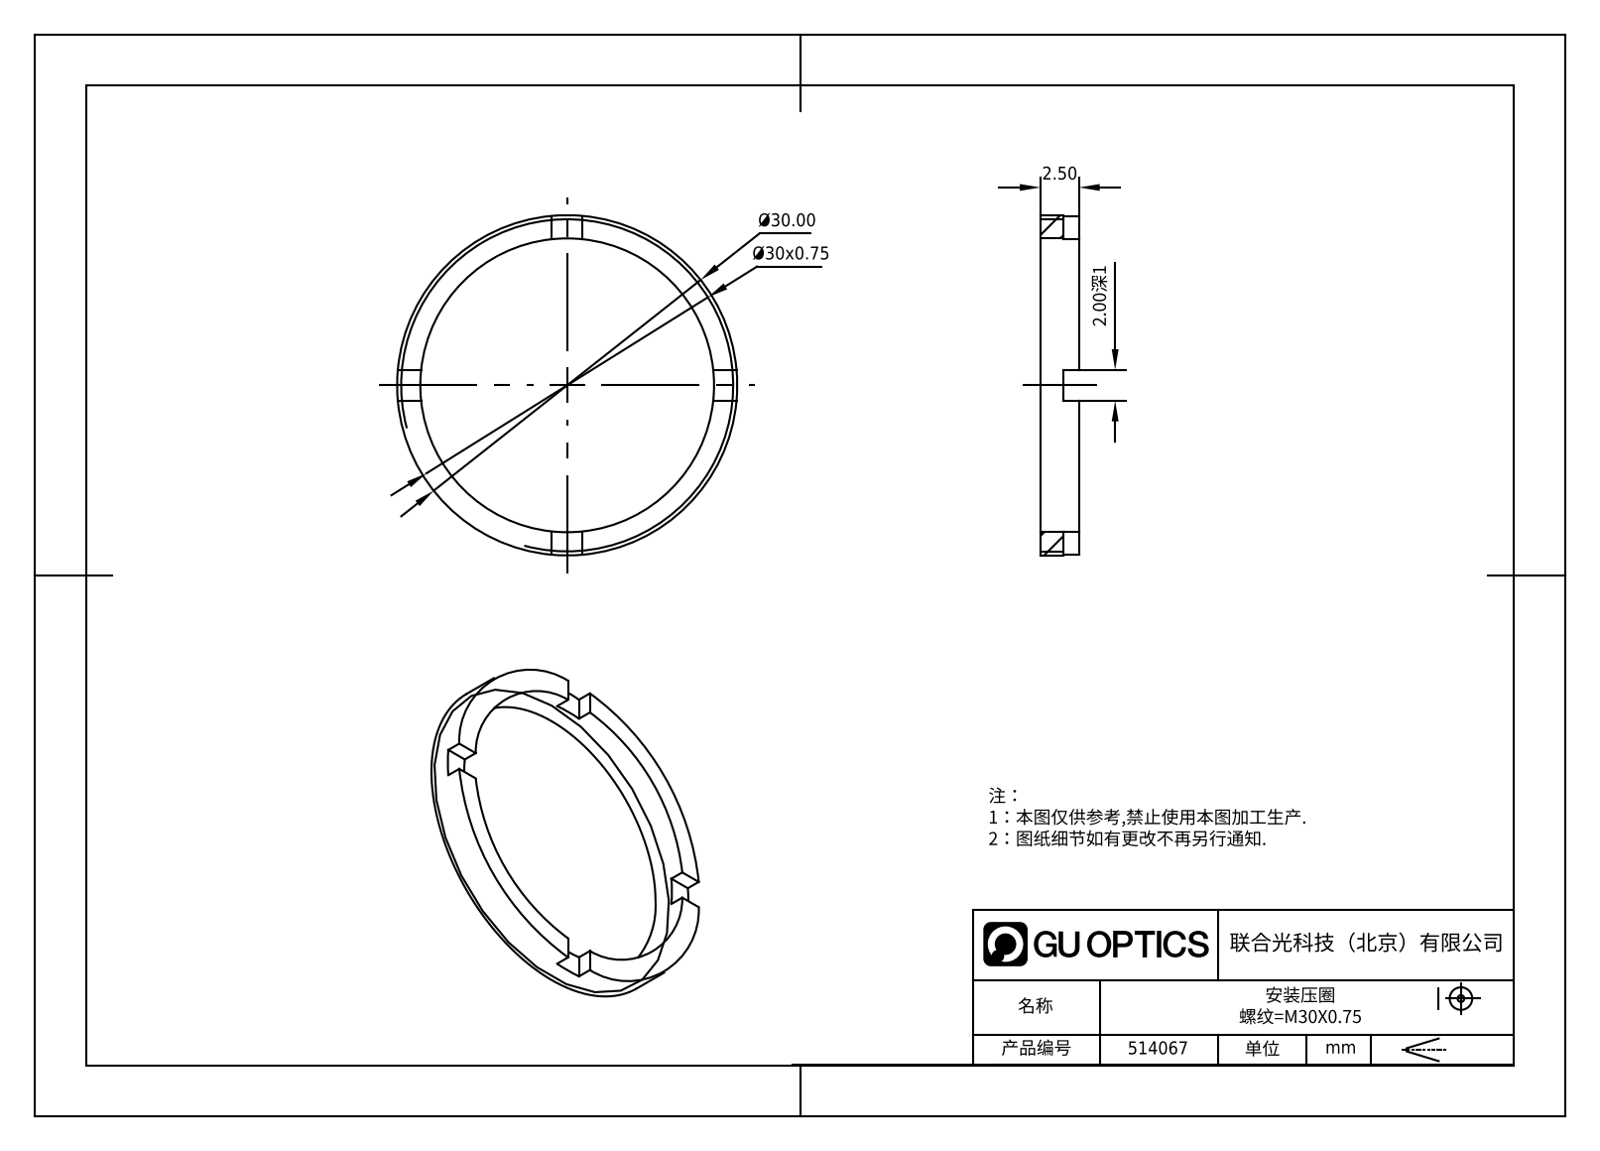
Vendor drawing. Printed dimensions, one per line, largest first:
Ø30.00
Ø30x0.75
2.50
2.00深1
